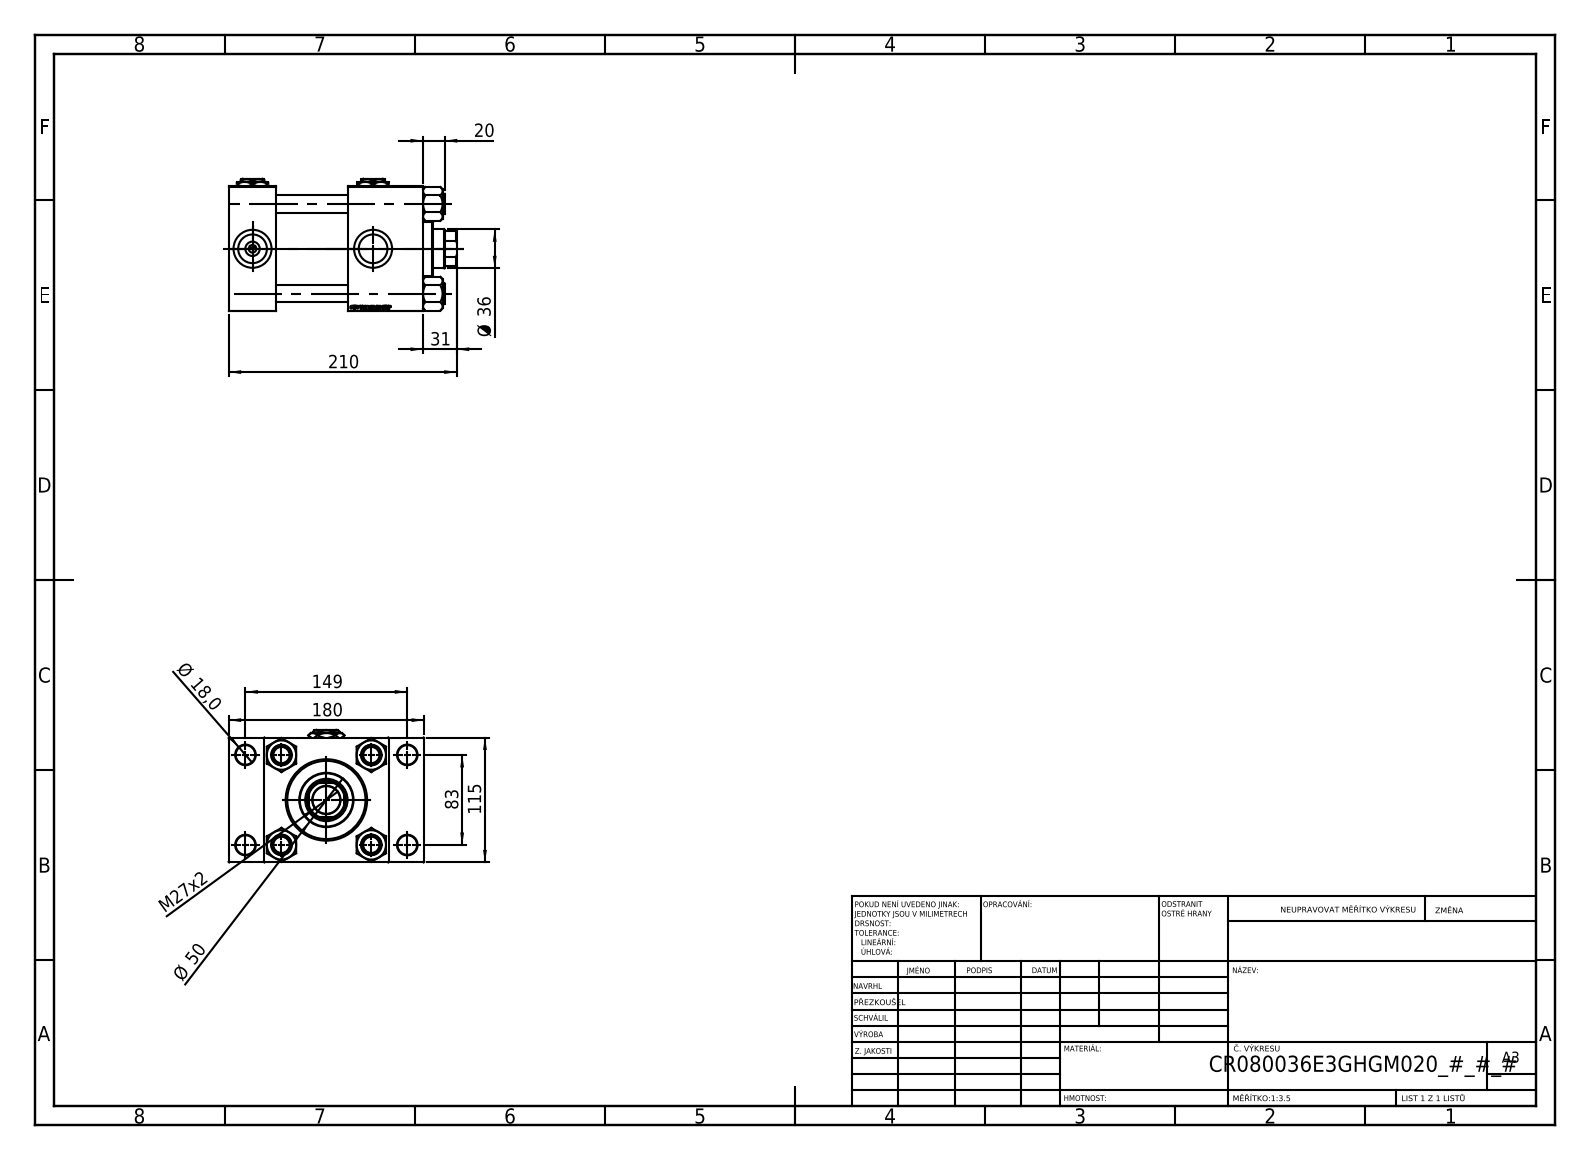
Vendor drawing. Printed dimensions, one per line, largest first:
210
180
149
115
83
Ø 50
Ø 36
31
M27x2
20
Ø 18,0
